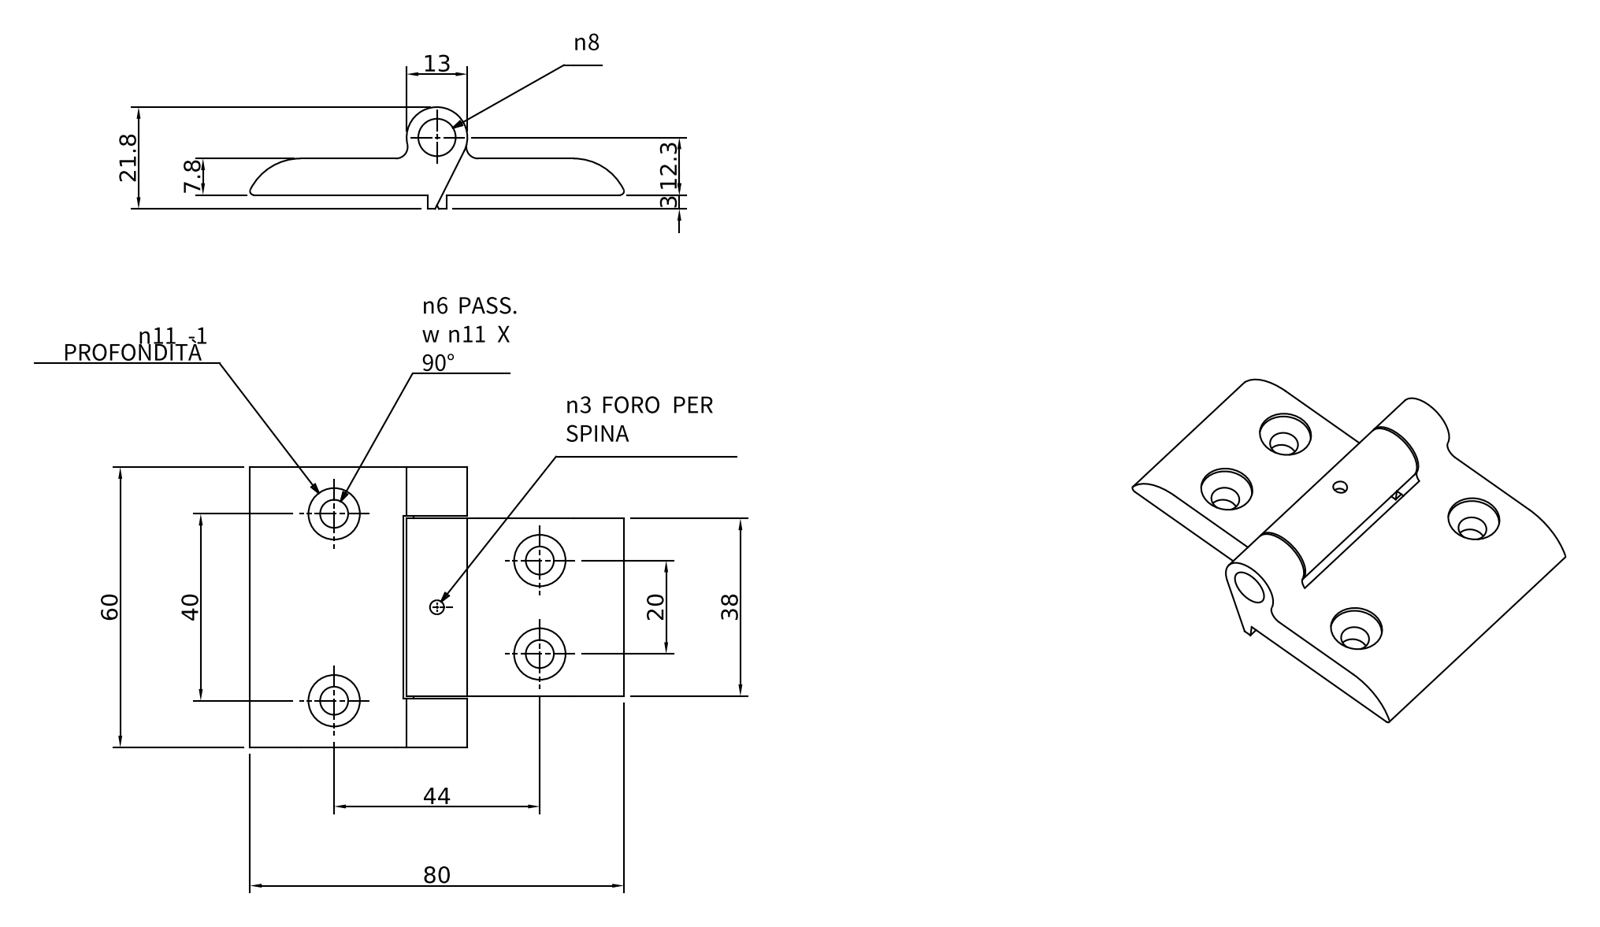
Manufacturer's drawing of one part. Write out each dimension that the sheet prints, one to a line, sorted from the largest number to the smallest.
80
60
44
40
38
21.8
20
13
12.3
7.8
3
